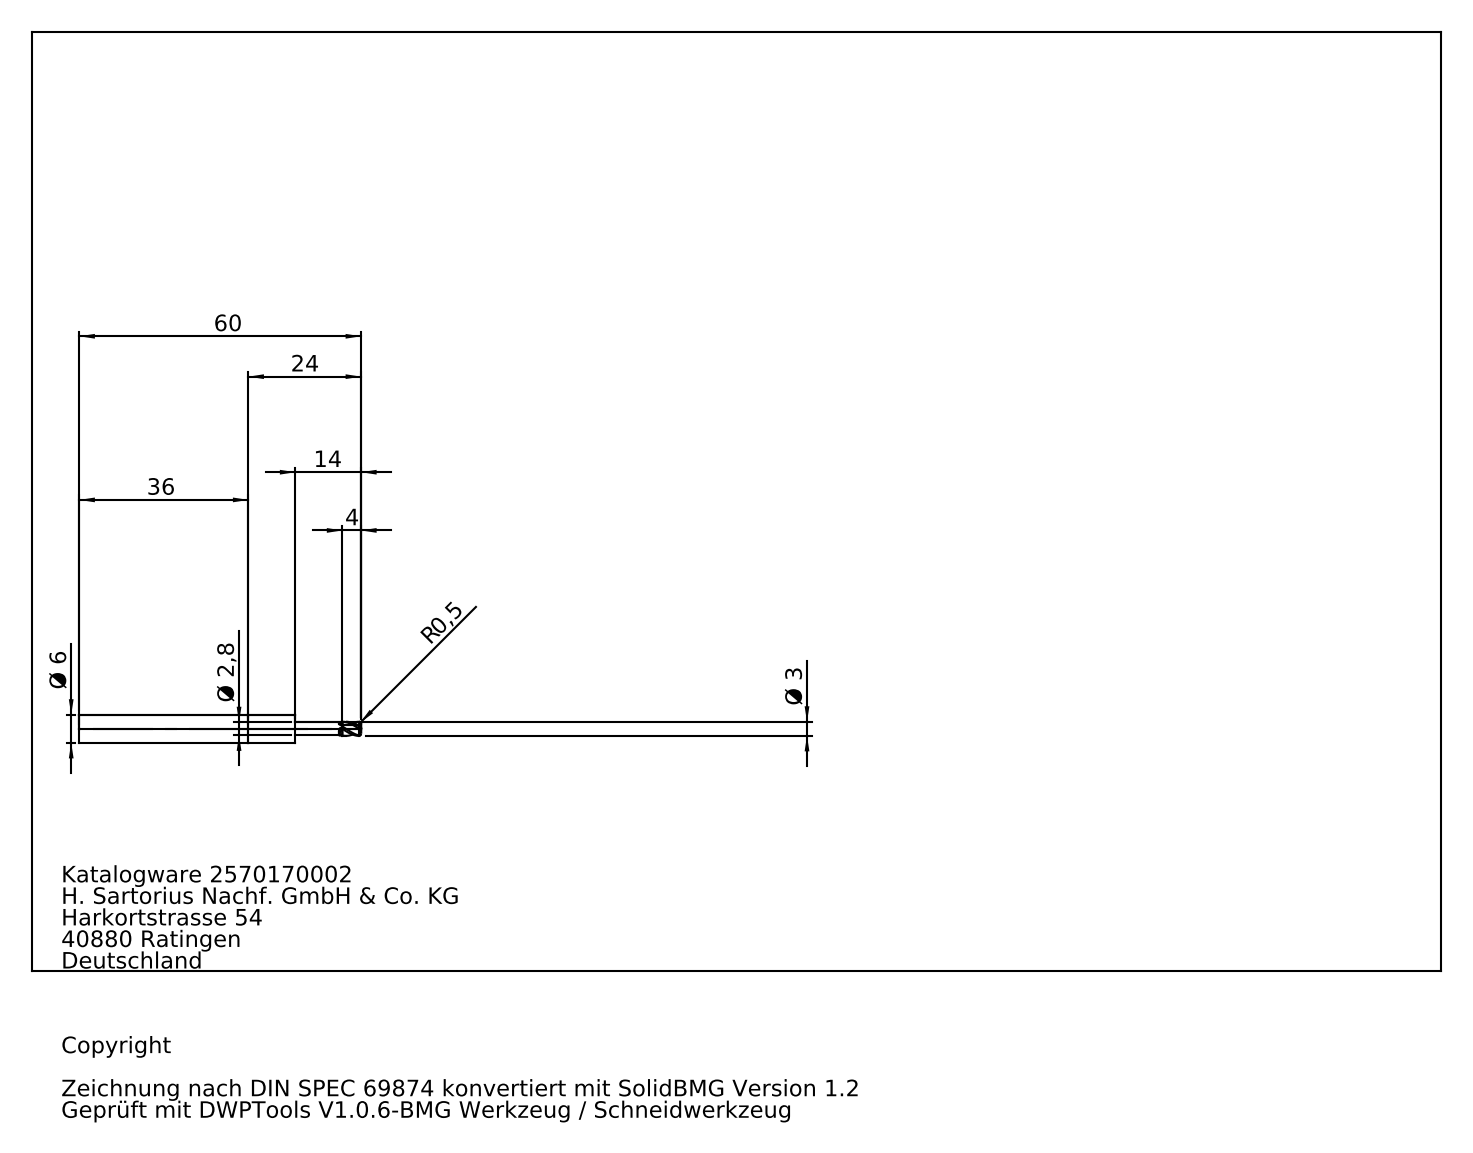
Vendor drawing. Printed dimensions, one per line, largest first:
60
36
24
14
Ø 6
4
Ø 3
Ø 2,8
R 0,5
